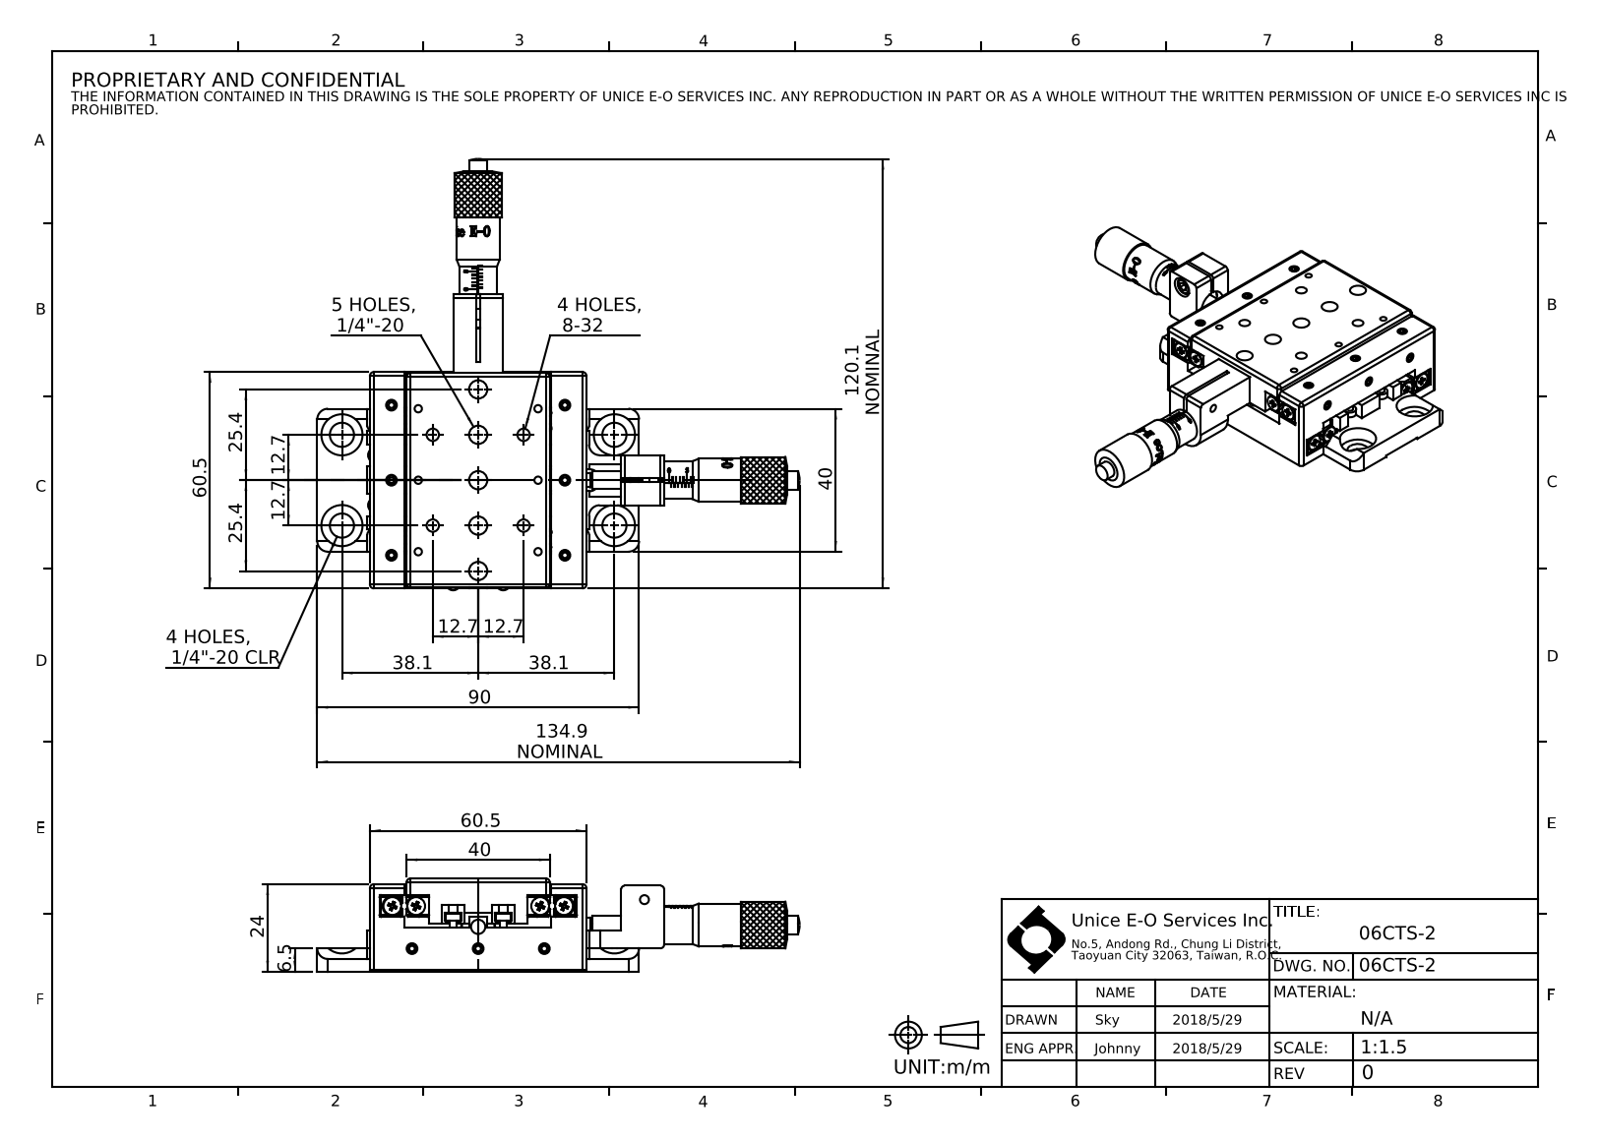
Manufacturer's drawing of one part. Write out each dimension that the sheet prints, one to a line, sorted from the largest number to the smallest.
134.9 NOMINAL
120.1 NOMINAL
90
60.5
60.5
40
40
38.1
38.1
25.4
25.4
24
12.7
12.7
12.7
12.7
6.5
5 HOLES, 1/4"-20
4 HOLES, 8-32
4 HOLES, 1/4"-20 CLR
